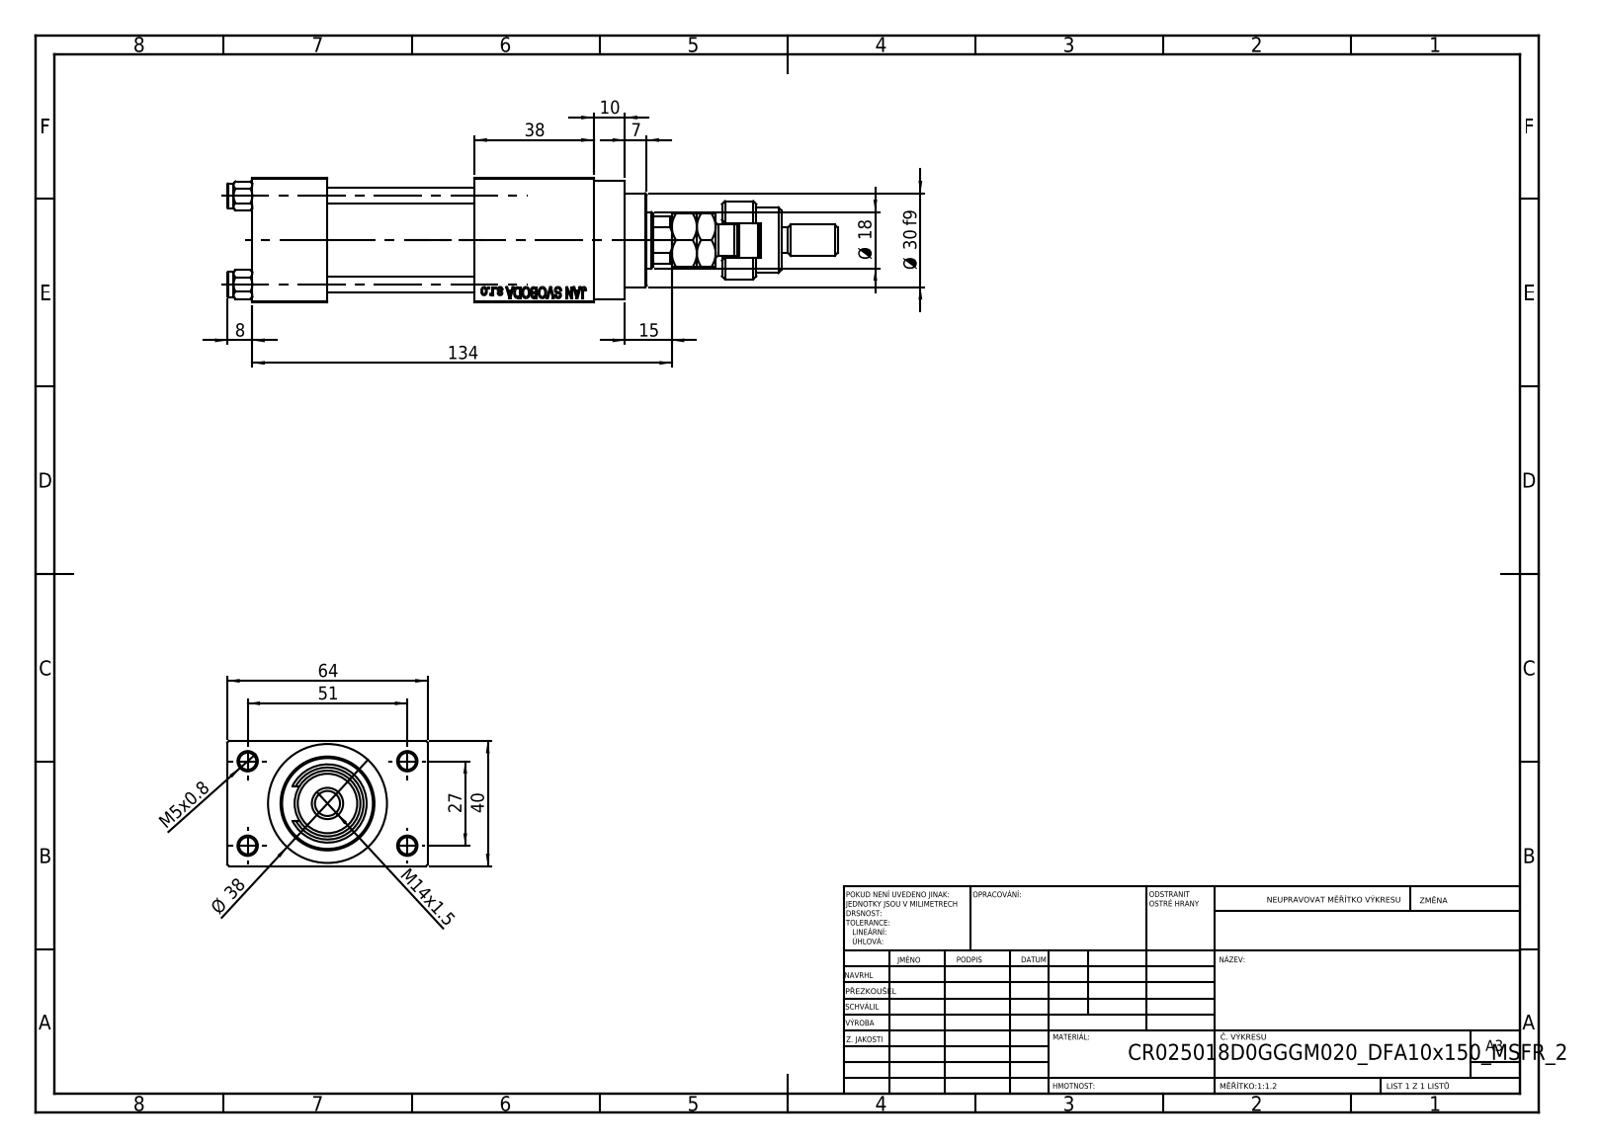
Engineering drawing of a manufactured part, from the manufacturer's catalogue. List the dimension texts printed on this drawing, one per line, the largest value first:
134
64
51
40
38
Ø 38
Ø 30 f9
27
Ø 18
15
M14x1.5
10
8
7
M5x0.8
